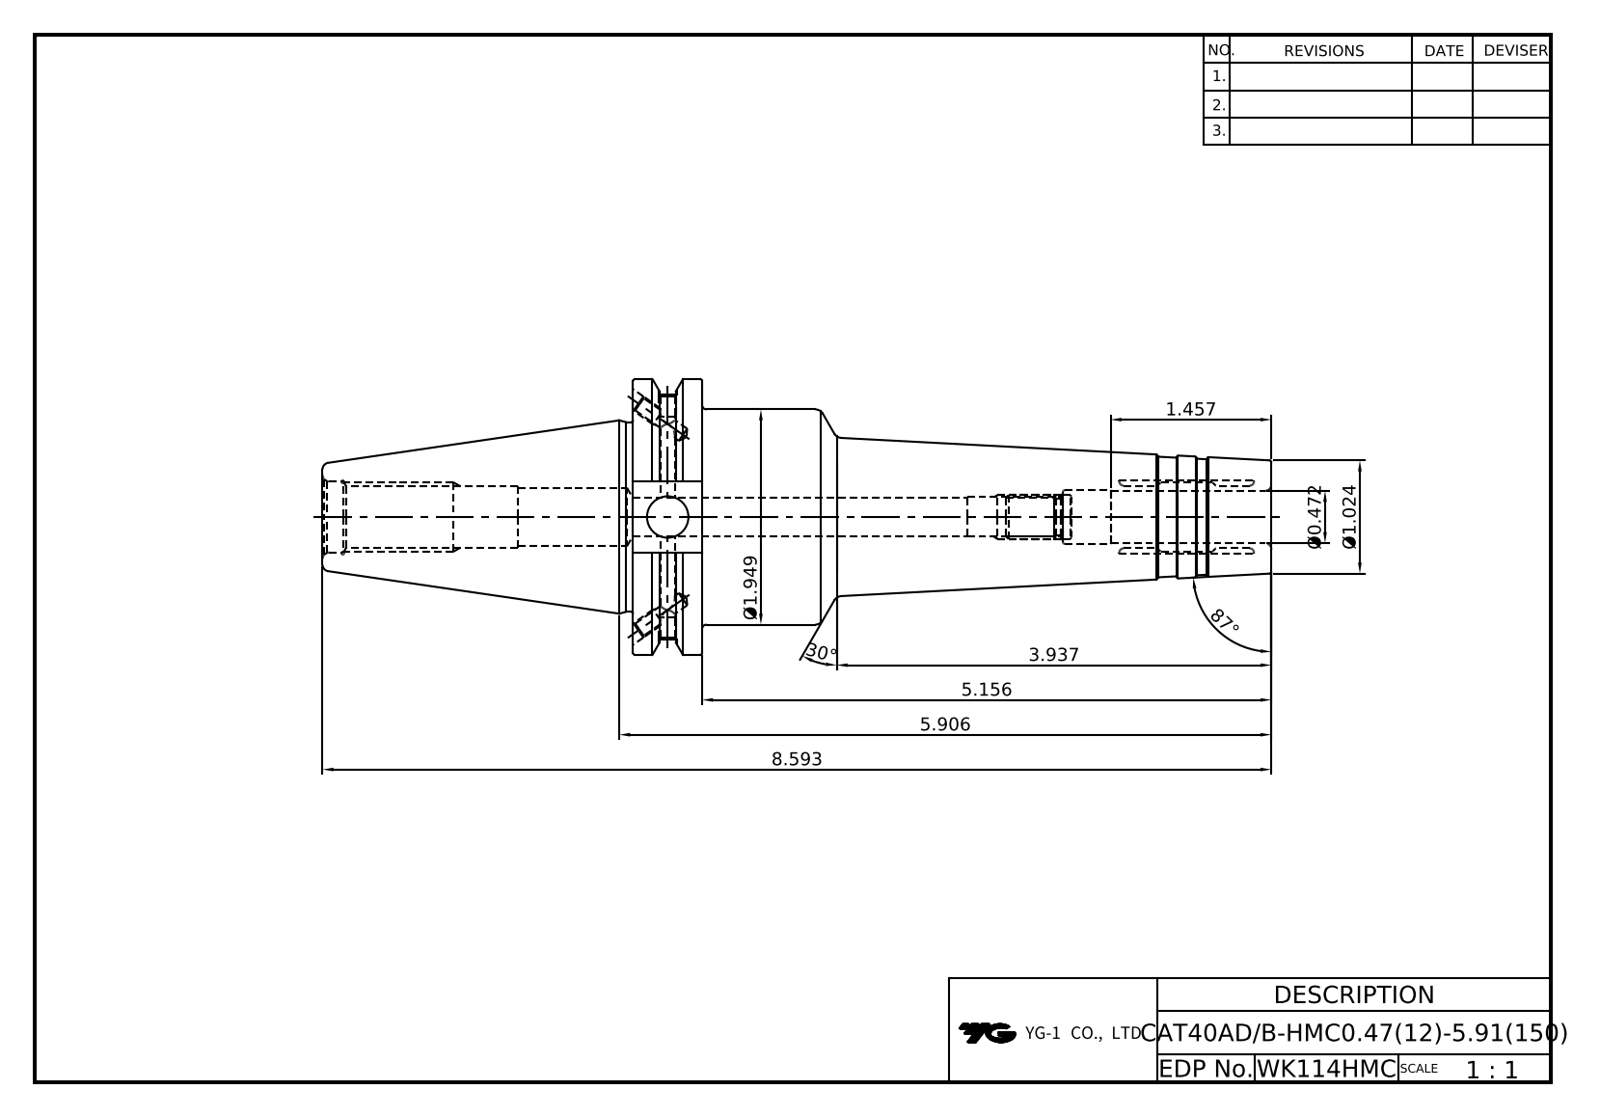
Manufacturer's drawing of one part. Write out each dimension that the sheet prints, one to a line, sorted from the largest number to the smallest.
87°
30°
8.593
5.906
5.156
3.937
Ø1.949
1.457
Ø1.024
Ø0.472
